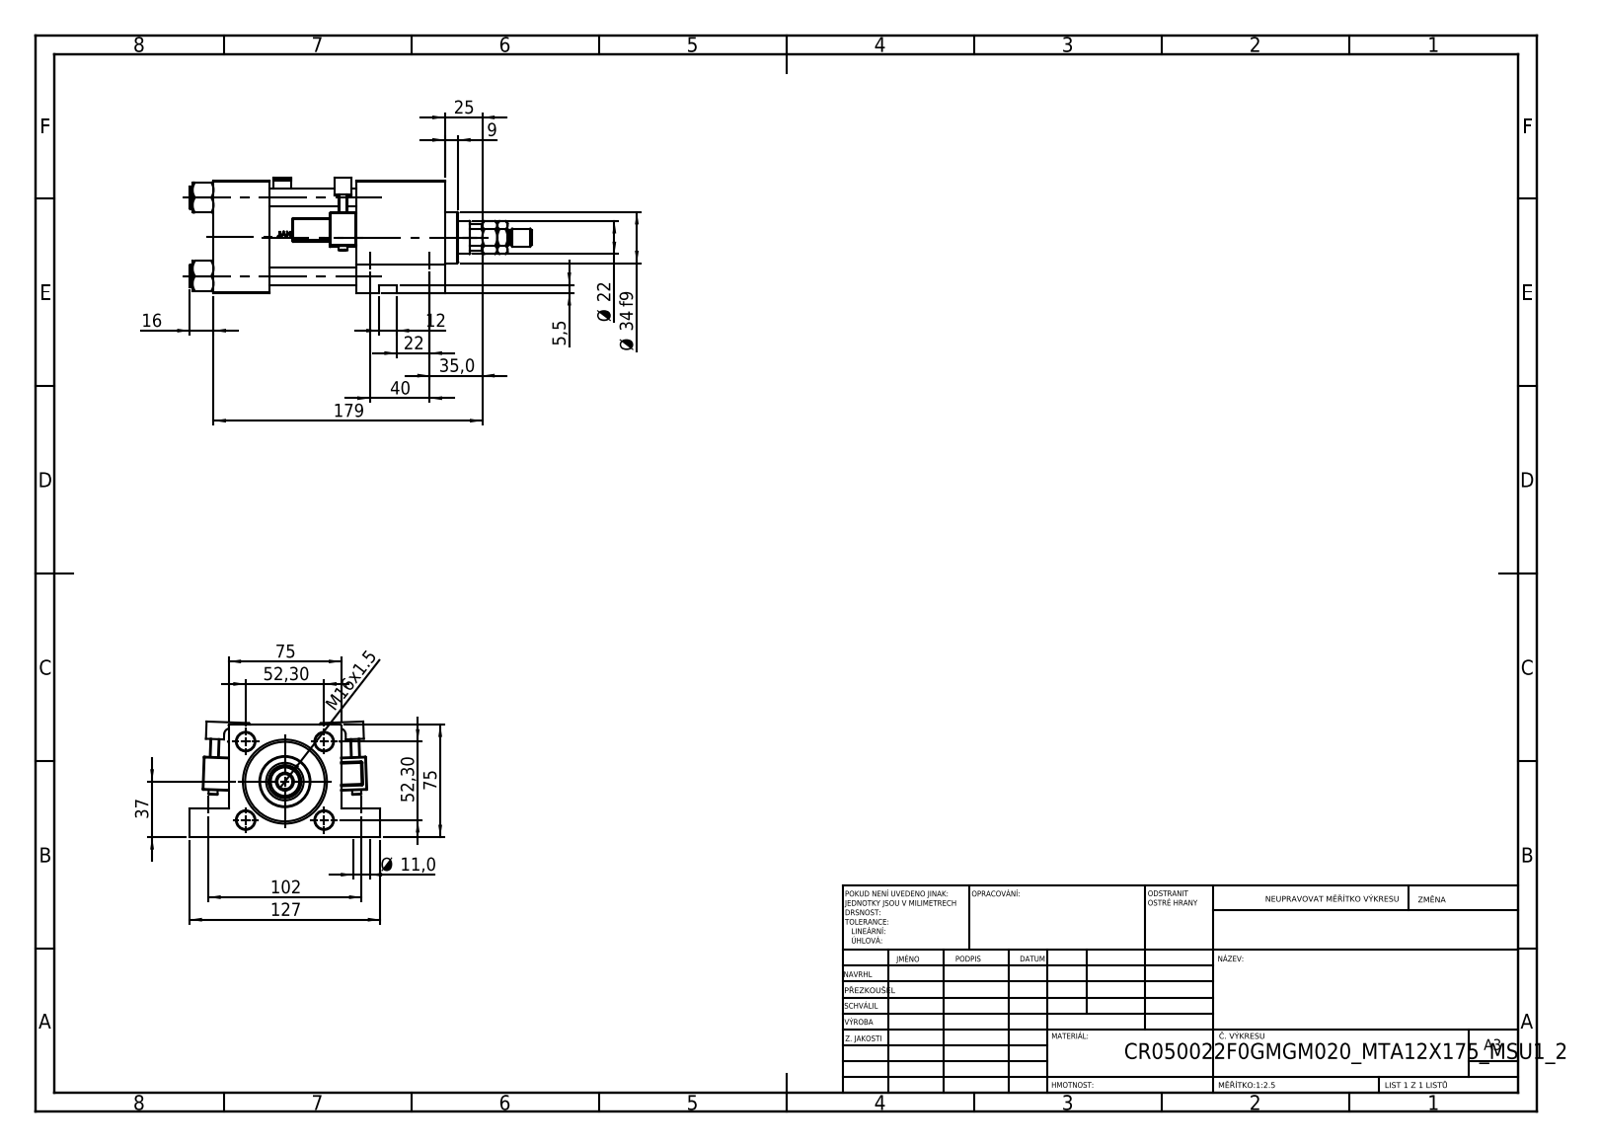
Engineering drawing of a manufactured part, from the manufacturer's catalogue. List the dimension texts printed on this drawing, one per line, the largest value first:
179
127
102
75
75
52,30
52,30
40
37
35,0
Ø 34 f9
25
Ø 22
22
16
M16x1.5
12
Ø 11,0
9
5,5
